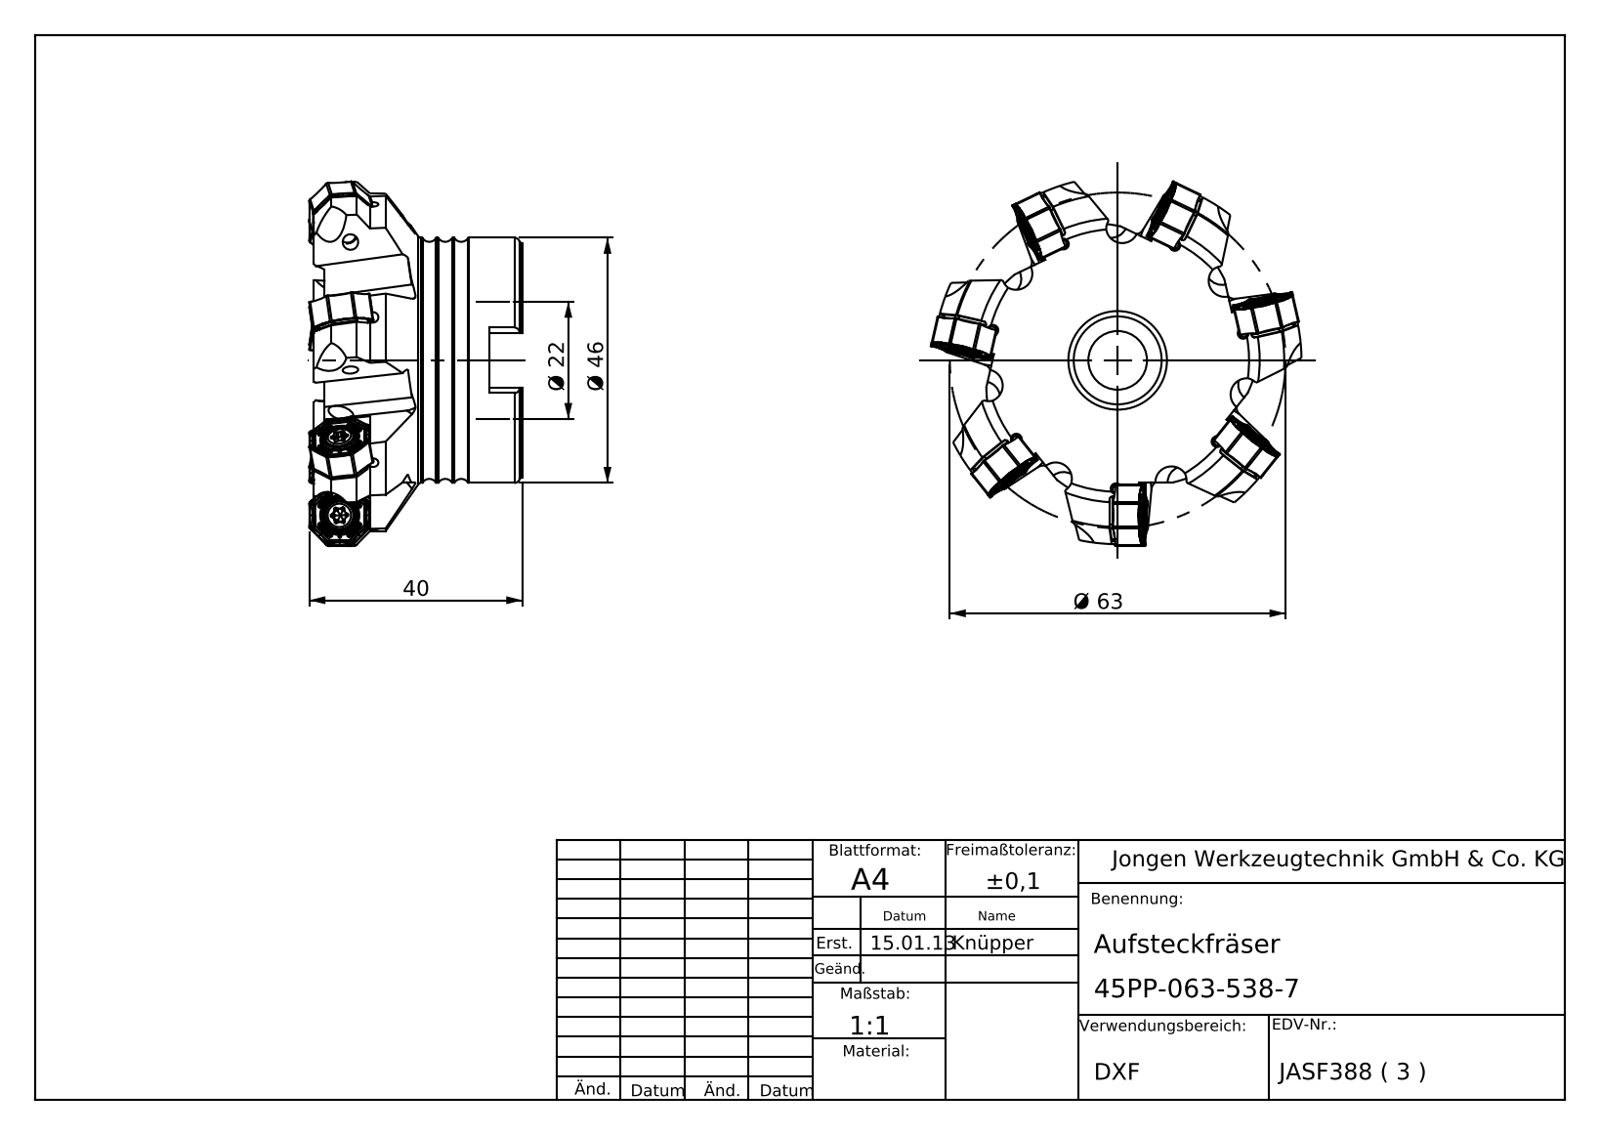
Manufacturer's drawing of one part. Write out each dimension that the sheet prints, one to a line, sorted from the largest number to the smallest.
Ø 63
Ø 46
40
Ø 22
